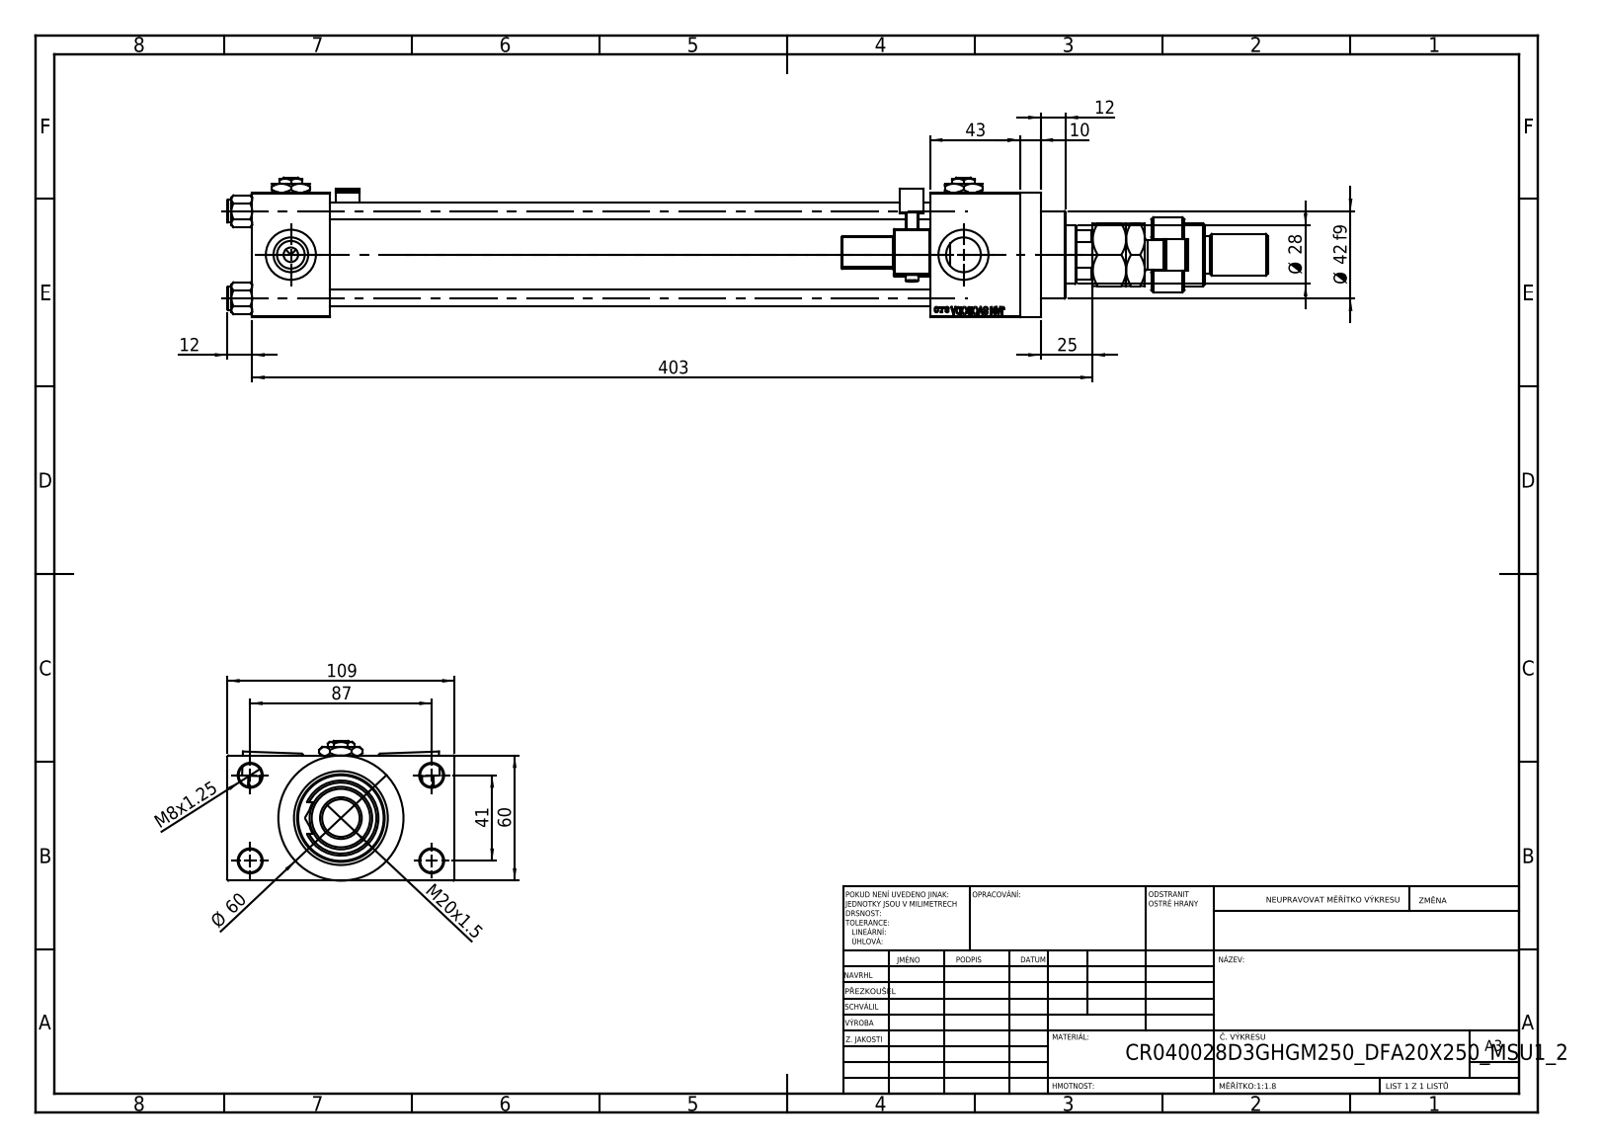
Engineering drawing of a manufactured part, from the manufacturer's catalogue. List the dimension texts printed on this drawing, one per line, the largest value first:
403
109
87
Ø 60
60
43
Ø 42 f9
41
Ø 28
25
M20x1.5
12
12
10
M8x1.25
